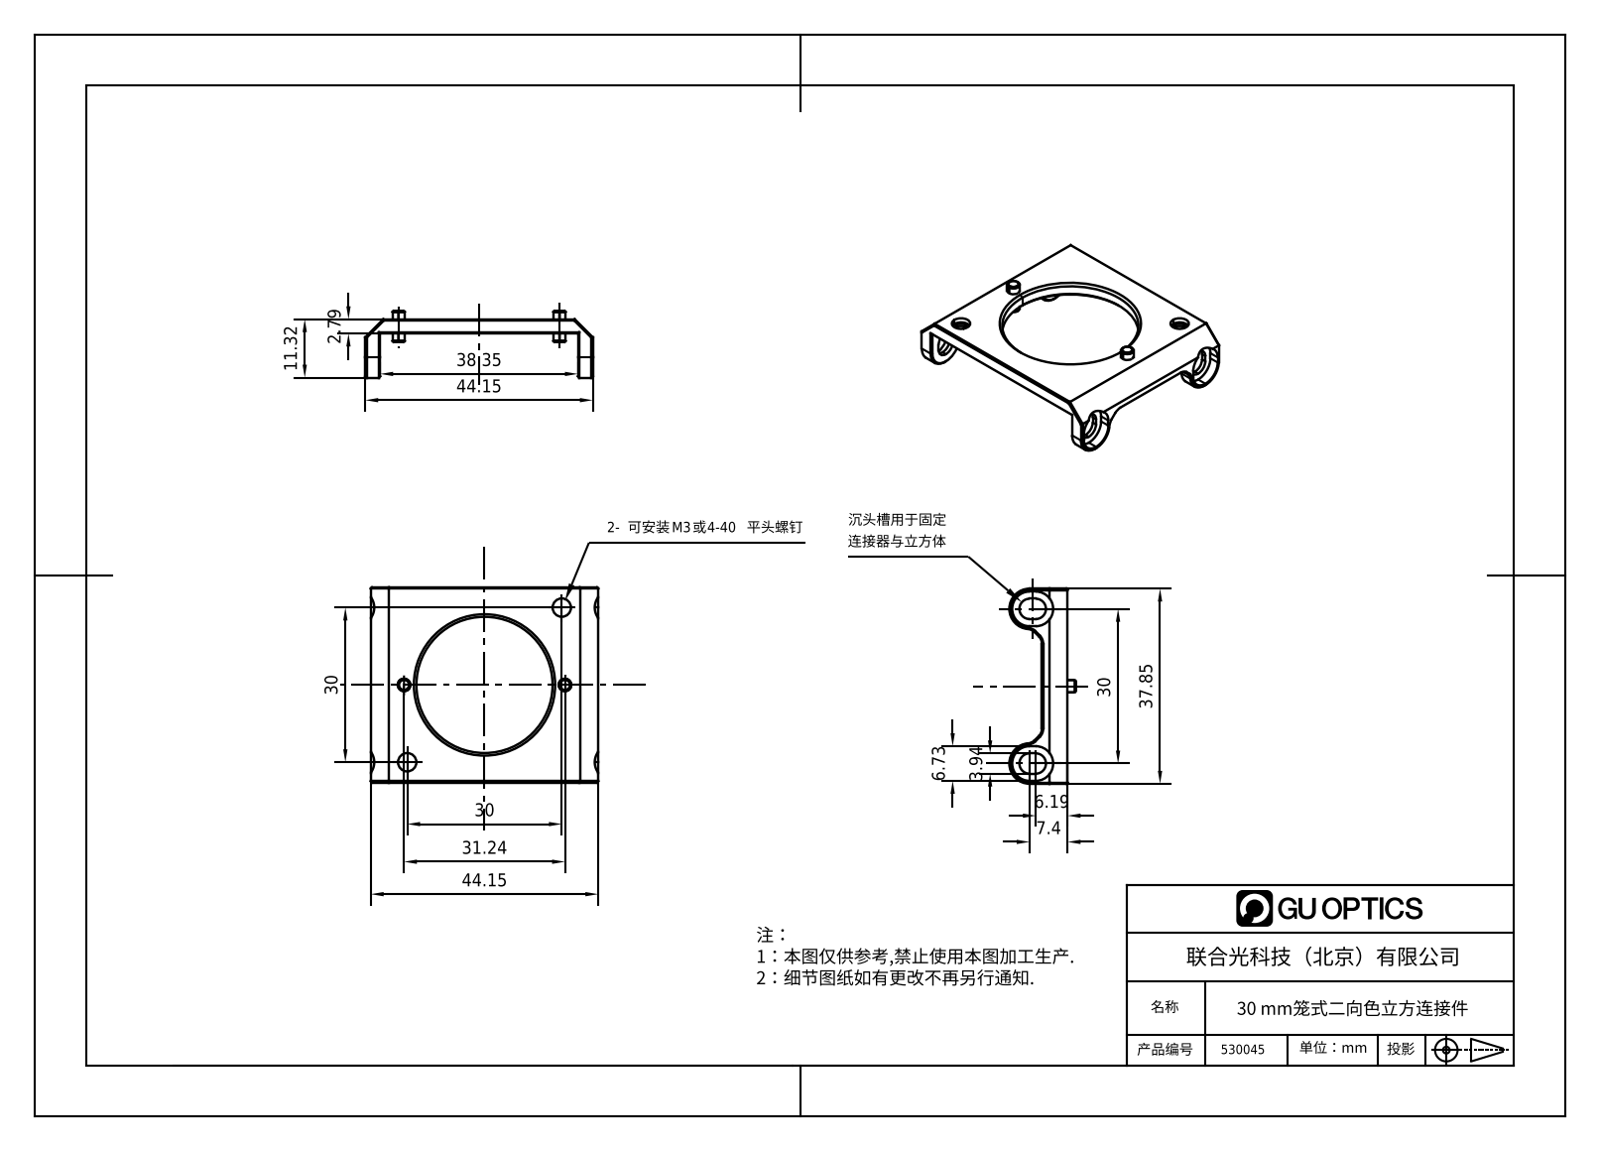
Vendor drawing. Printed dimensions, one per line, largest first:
44.15
44.15
38.35
37.85
31.24
30
30
30
11.32
7.4
6.73
6.19
3.94
2.79
